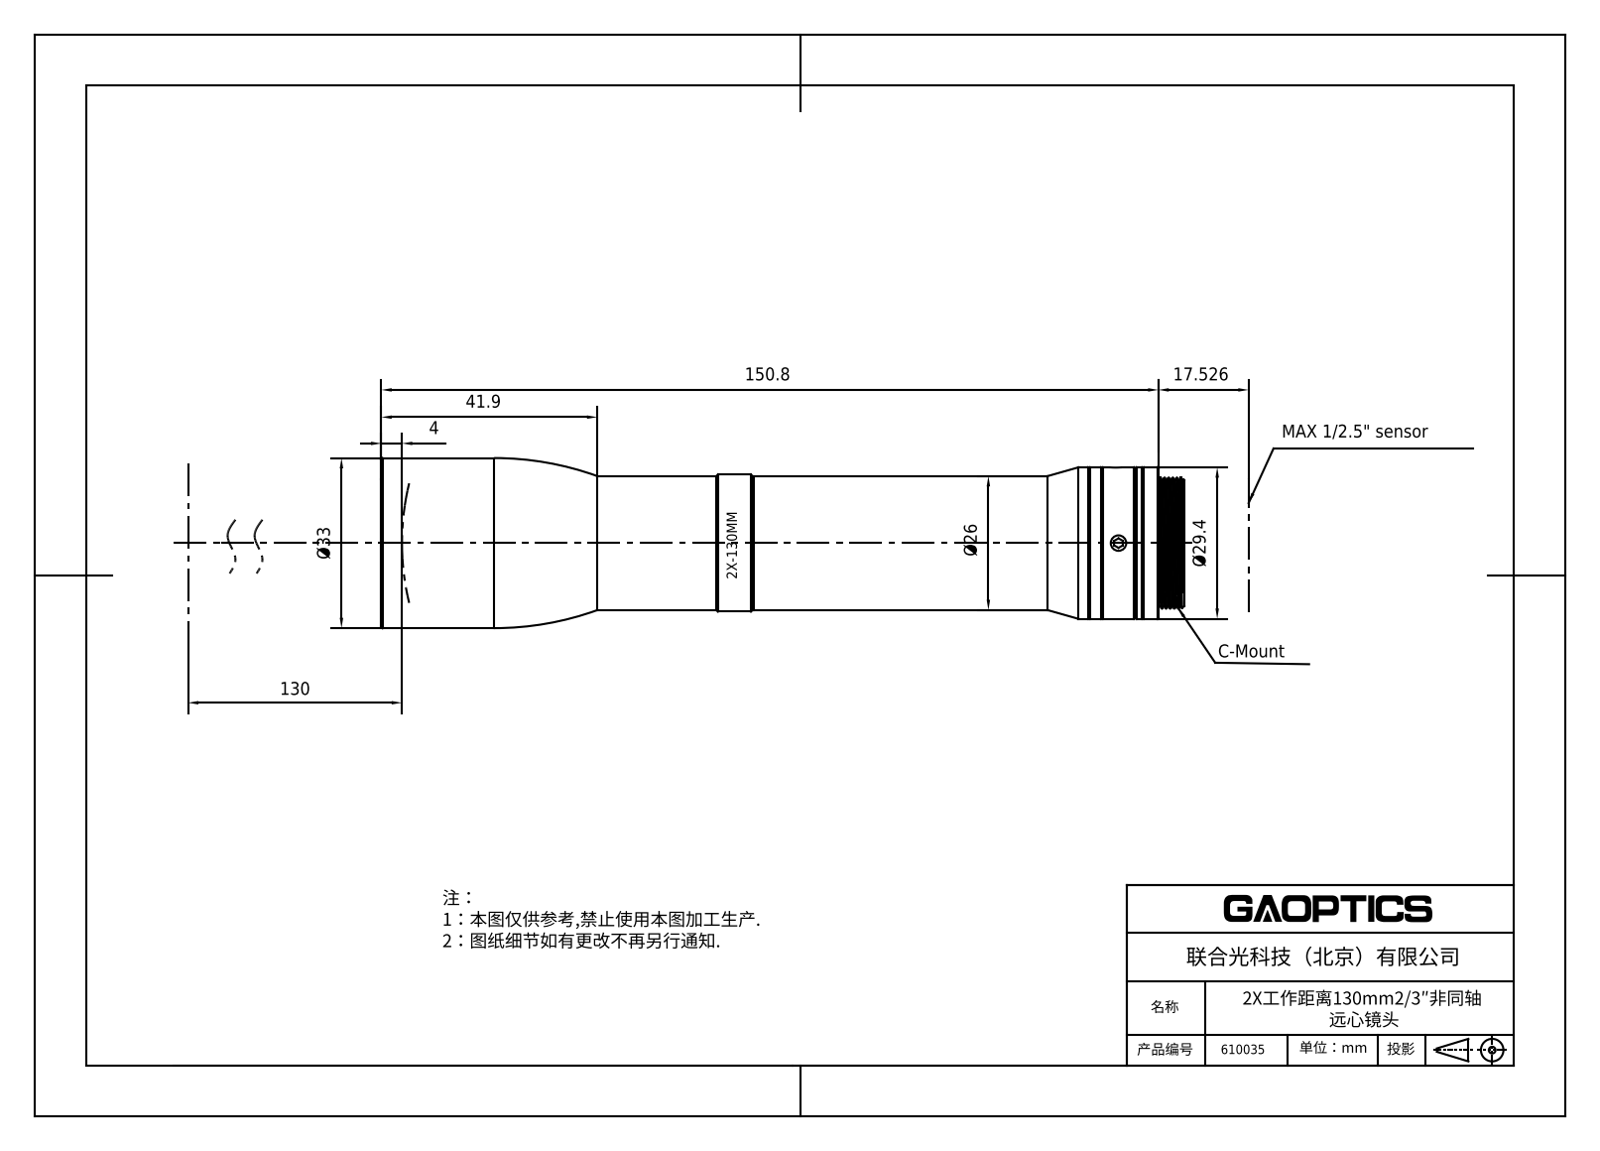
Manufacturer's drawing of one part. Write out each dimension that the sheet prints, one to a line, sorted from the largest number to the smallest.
150.8
130
41.9
Ø33
Ø29.4
Ø26
17.526
4
